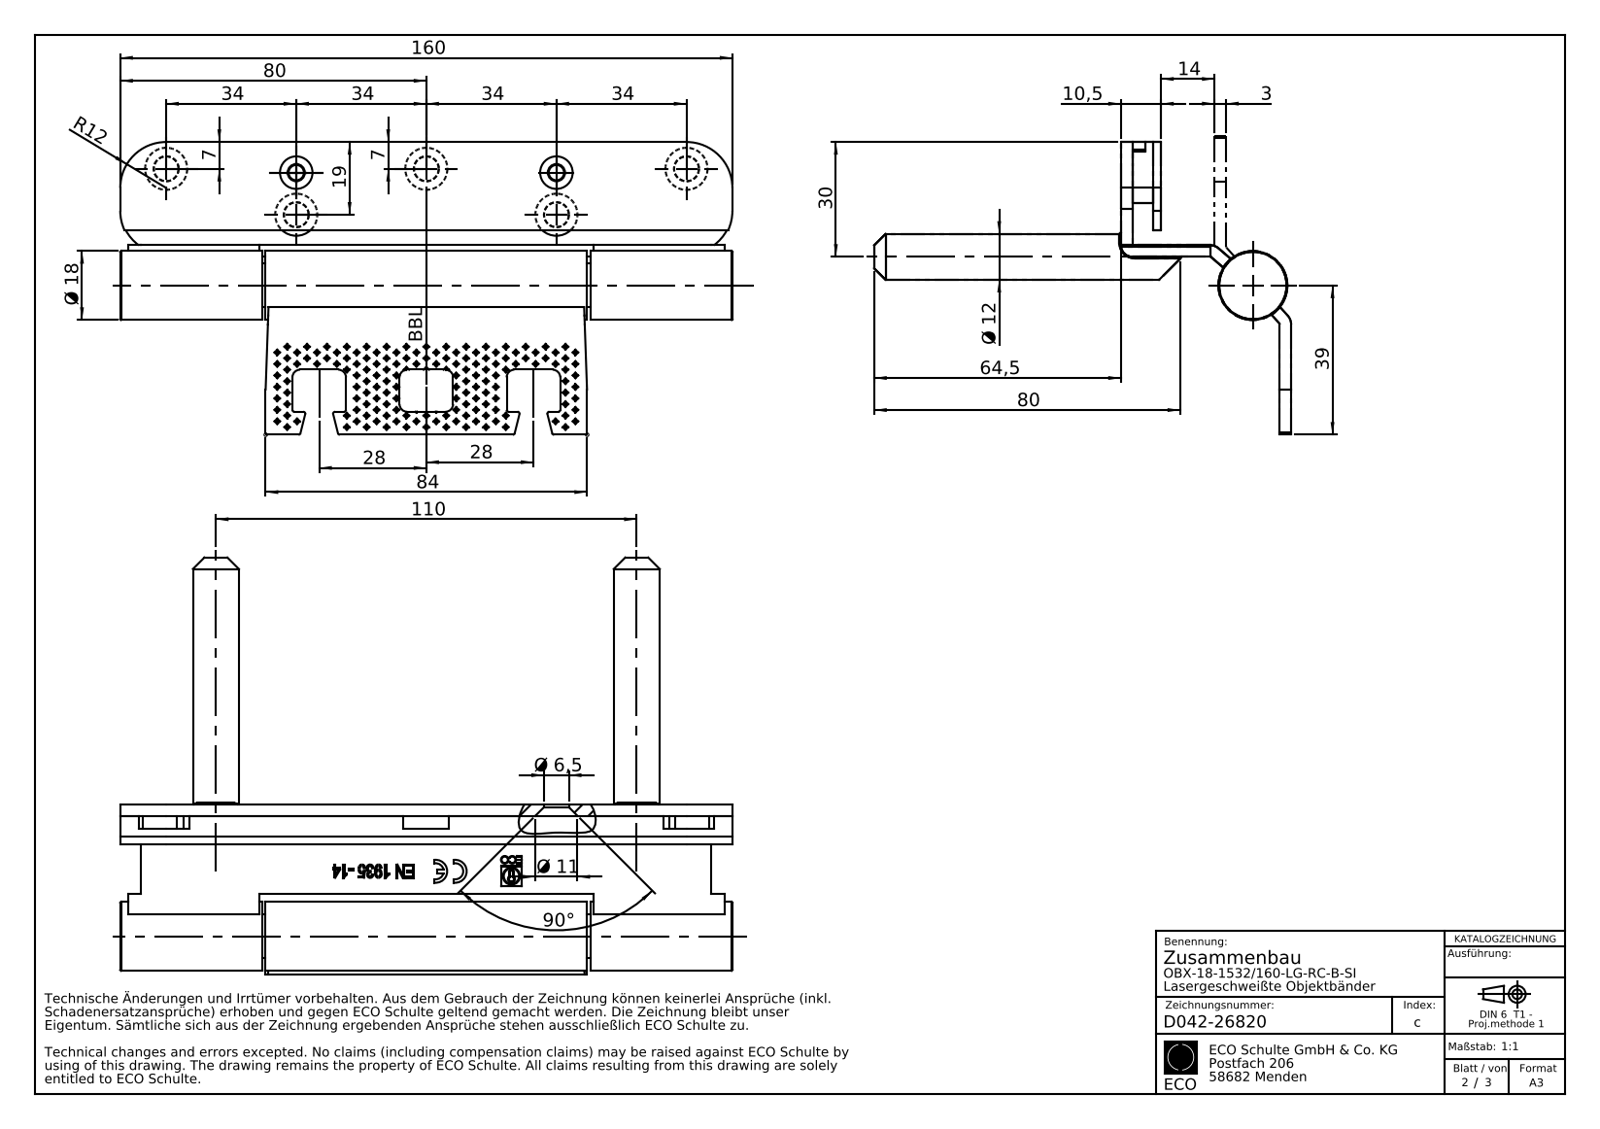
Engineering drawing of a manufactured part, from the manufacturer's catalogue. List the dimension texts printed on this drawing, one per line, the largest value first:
160
110
90°
84
80
80
64,5
39
34
34
34
34
30
28
28
19
Ø 18
14
R12
Ø 12
Ø 11
10,5
7
7
Ø 6,5
3
